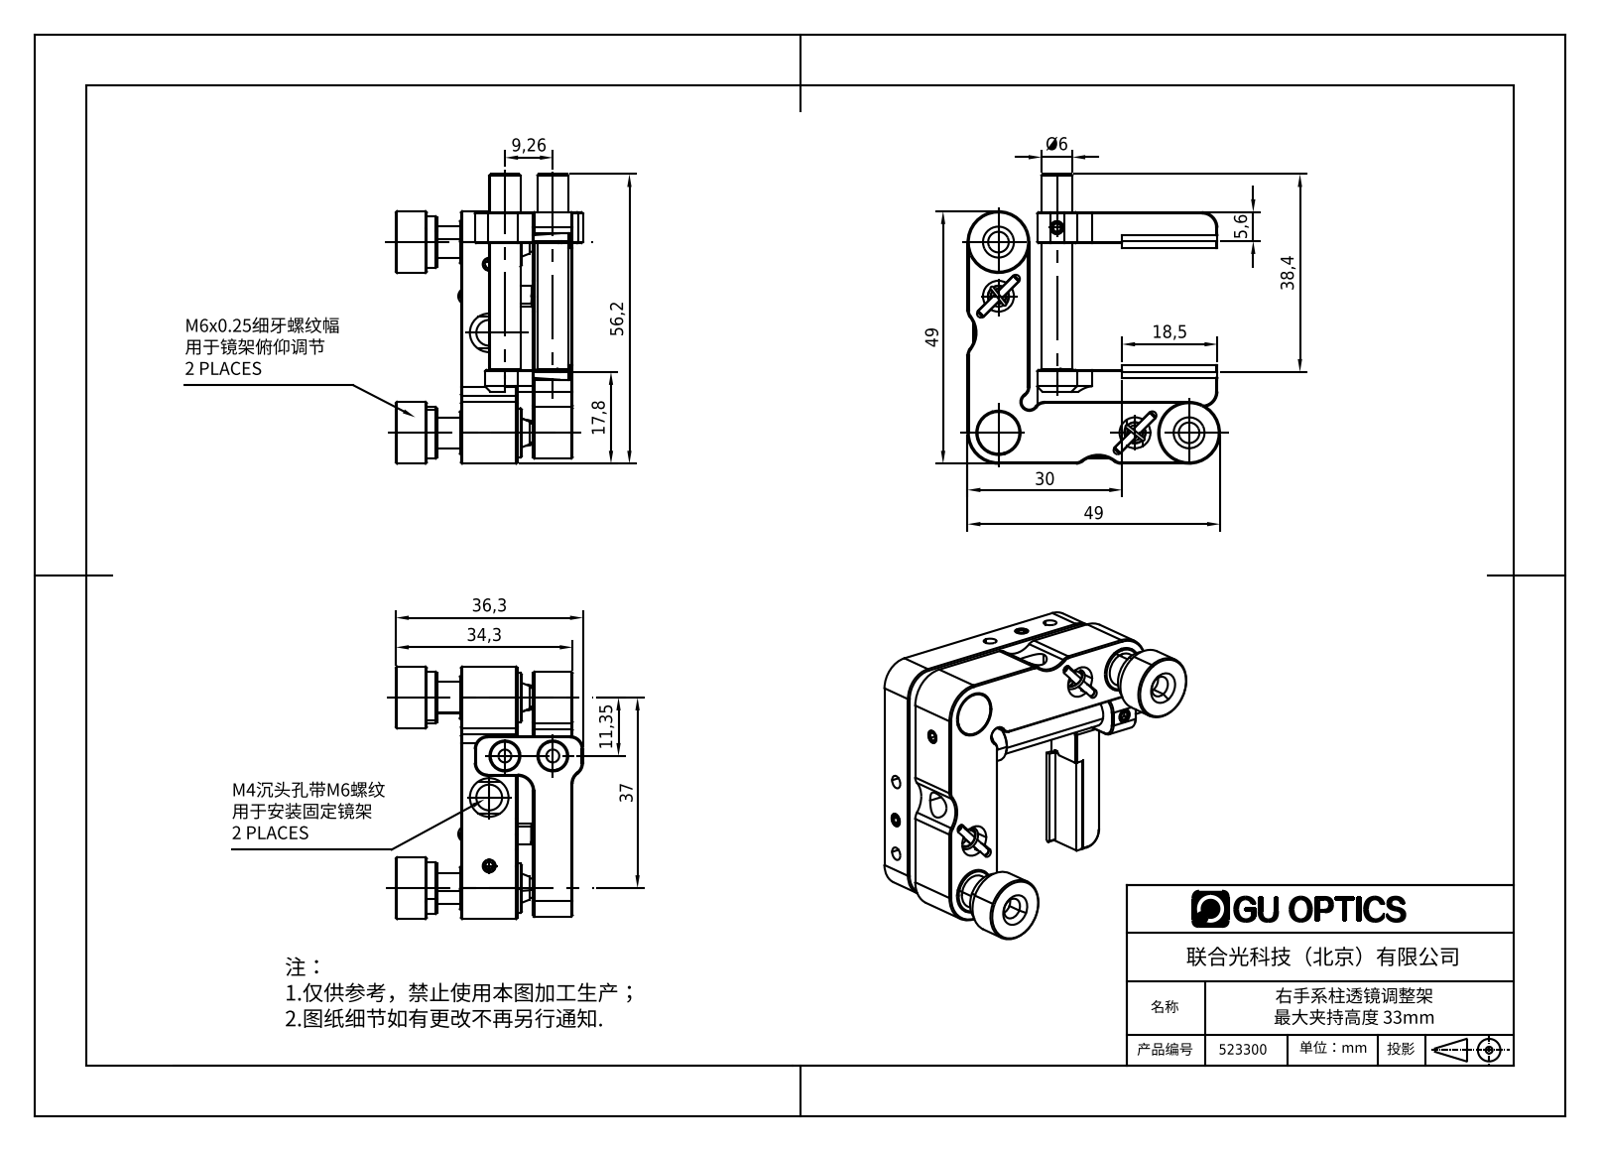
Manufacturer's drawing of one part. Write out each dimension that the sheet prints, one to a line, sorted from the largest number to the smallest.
56,2
49
49
38,4
37
36,3
34,3
30
18,5
17,8
11,35
9,26
Ø6
5,6
